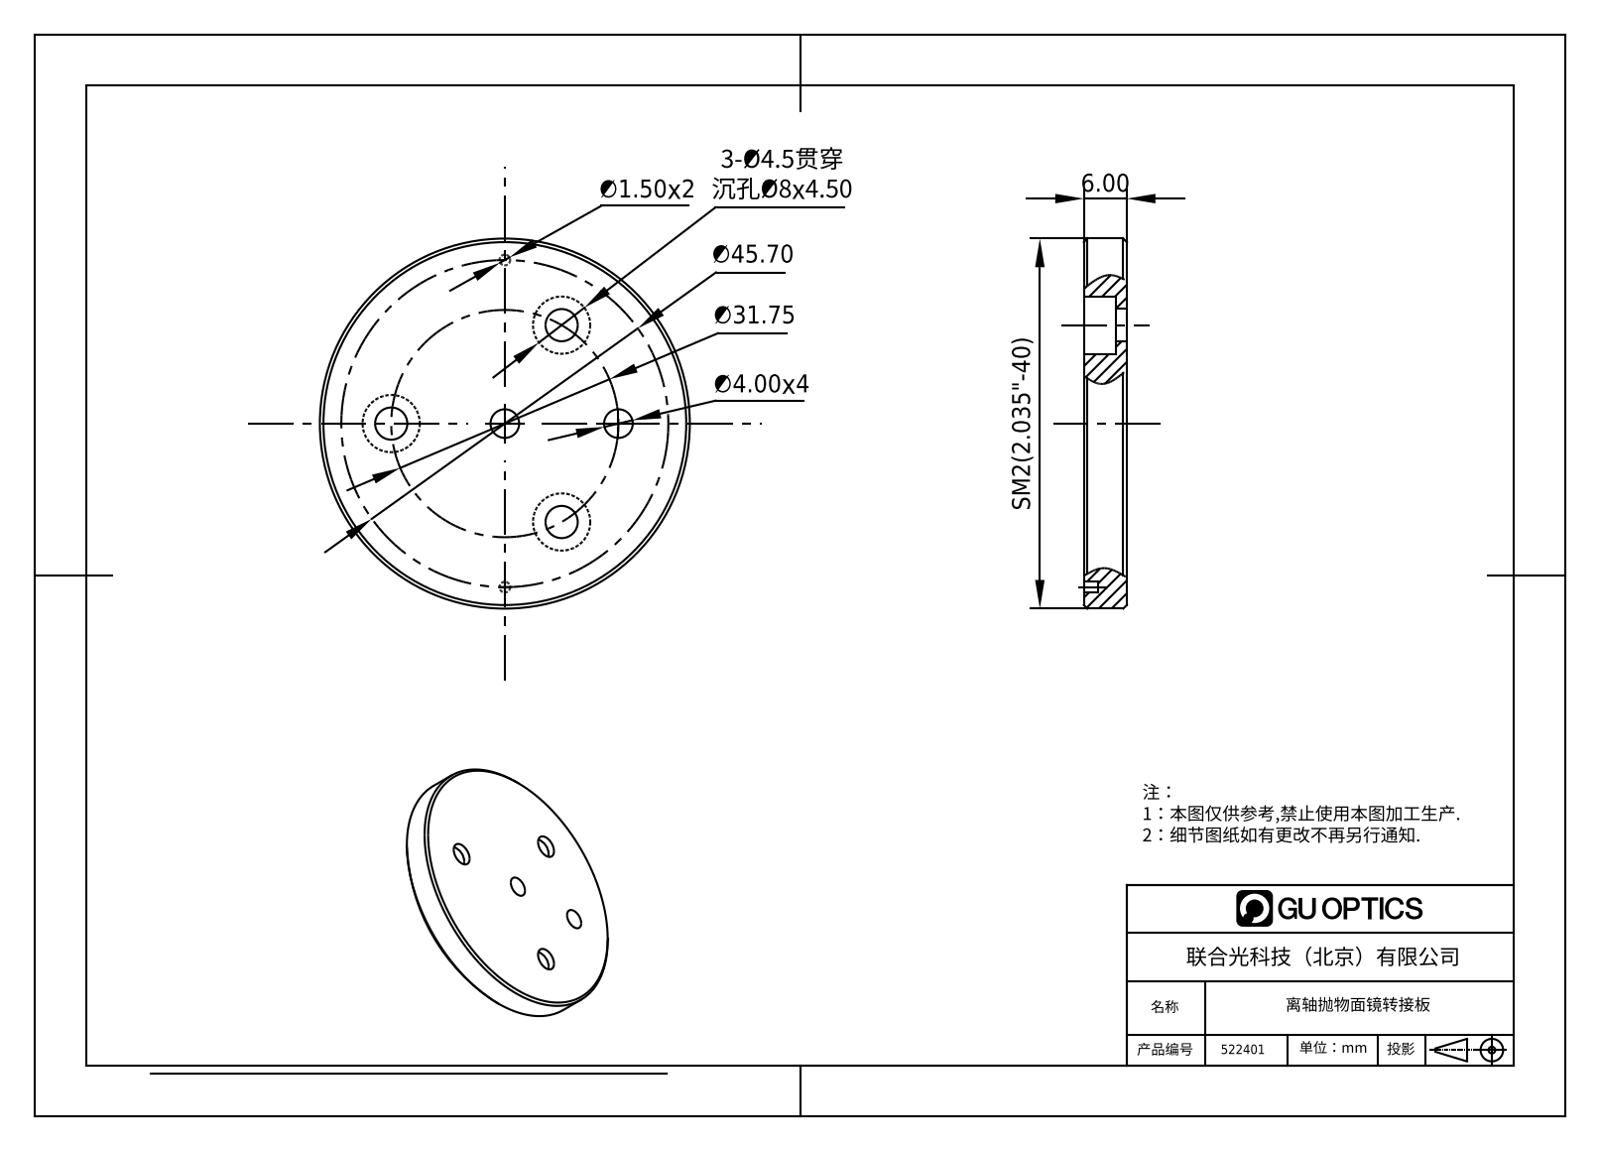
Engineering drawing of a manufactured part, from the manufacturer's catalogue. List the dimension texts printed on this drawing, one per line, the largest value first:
∅45.70
∅31.75
6.00
3-Ø4.5贯穿 沉孔Ø8x4.50
x4
x2
SM2(2.035"-40)
